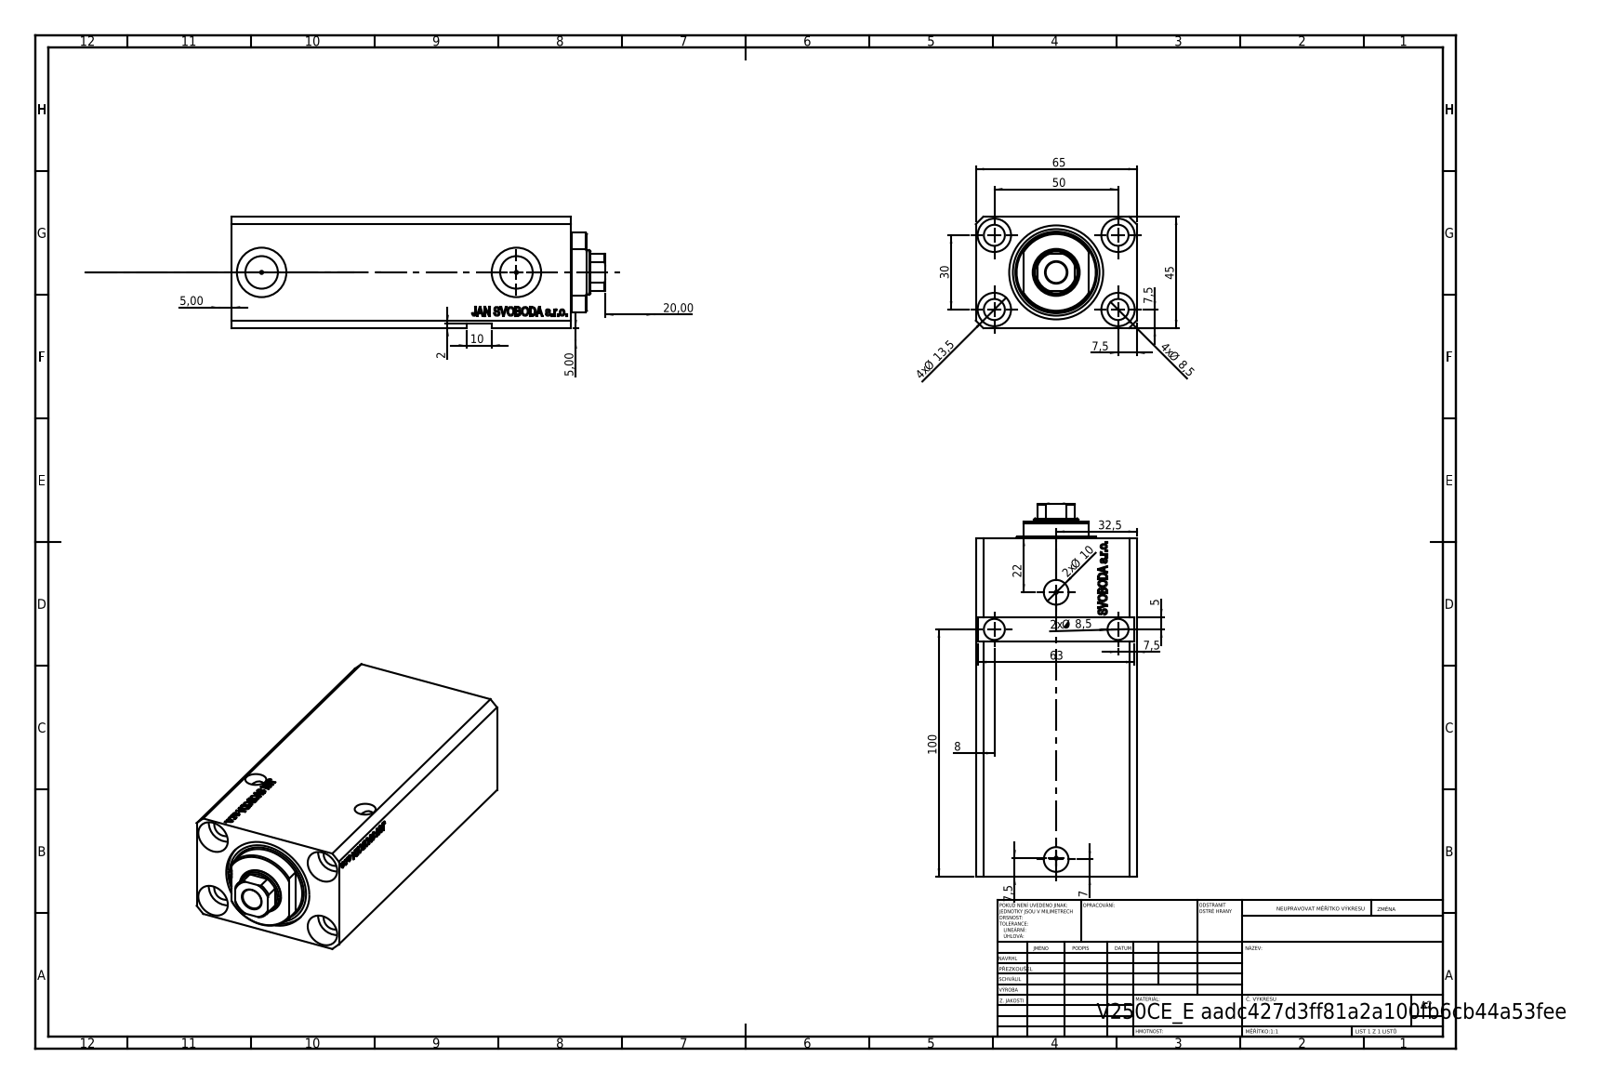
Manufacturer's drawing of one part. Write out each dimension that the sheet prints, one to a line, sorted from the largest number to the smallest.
100
65
63
50
45
32,5
30
22
20,00
4x Ø 13,5
10
2x Ø 10
4x Ø 8,5
2x Ø 8,5
8
7,5
7,5
7,5
7,5
7
5,00
5,00
5
2
